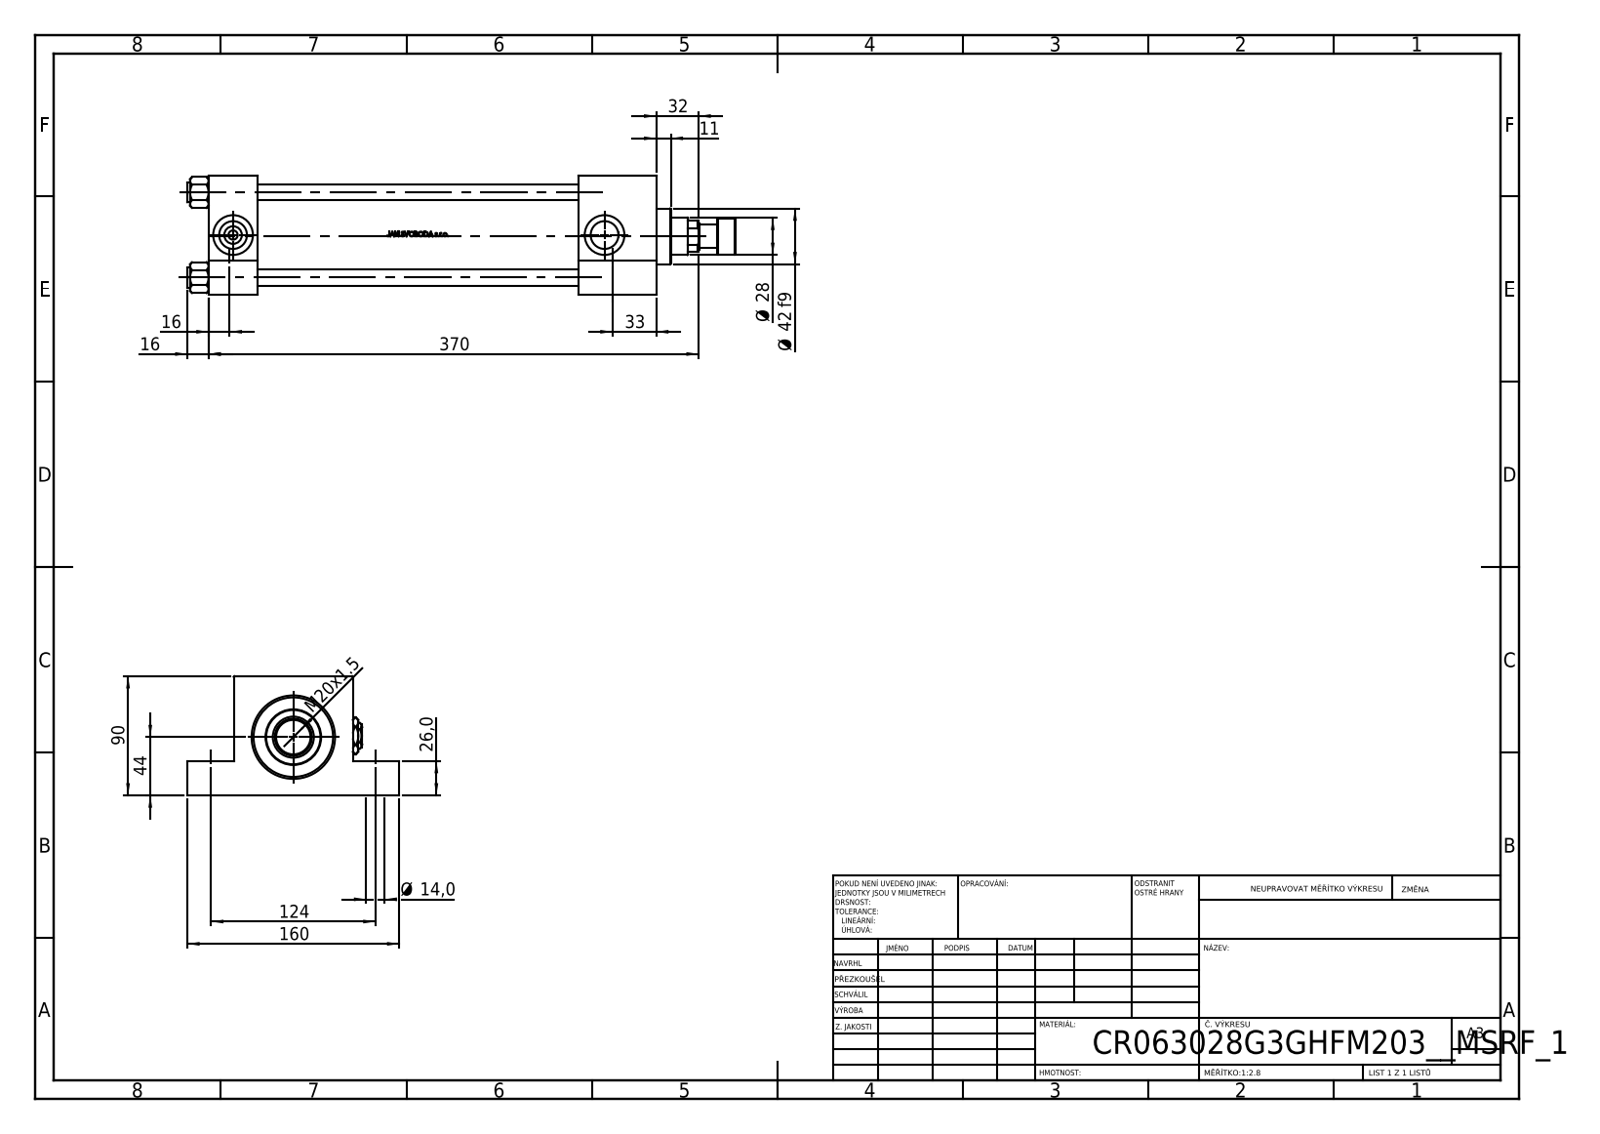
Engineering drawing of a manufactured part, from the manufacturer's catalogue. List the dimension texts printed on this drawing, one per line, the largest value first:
370
160
124
90
44
Ø 42 f9
33
32
Ø 28
26,0
M20x1.5
16
16
Ø 14,0
11
